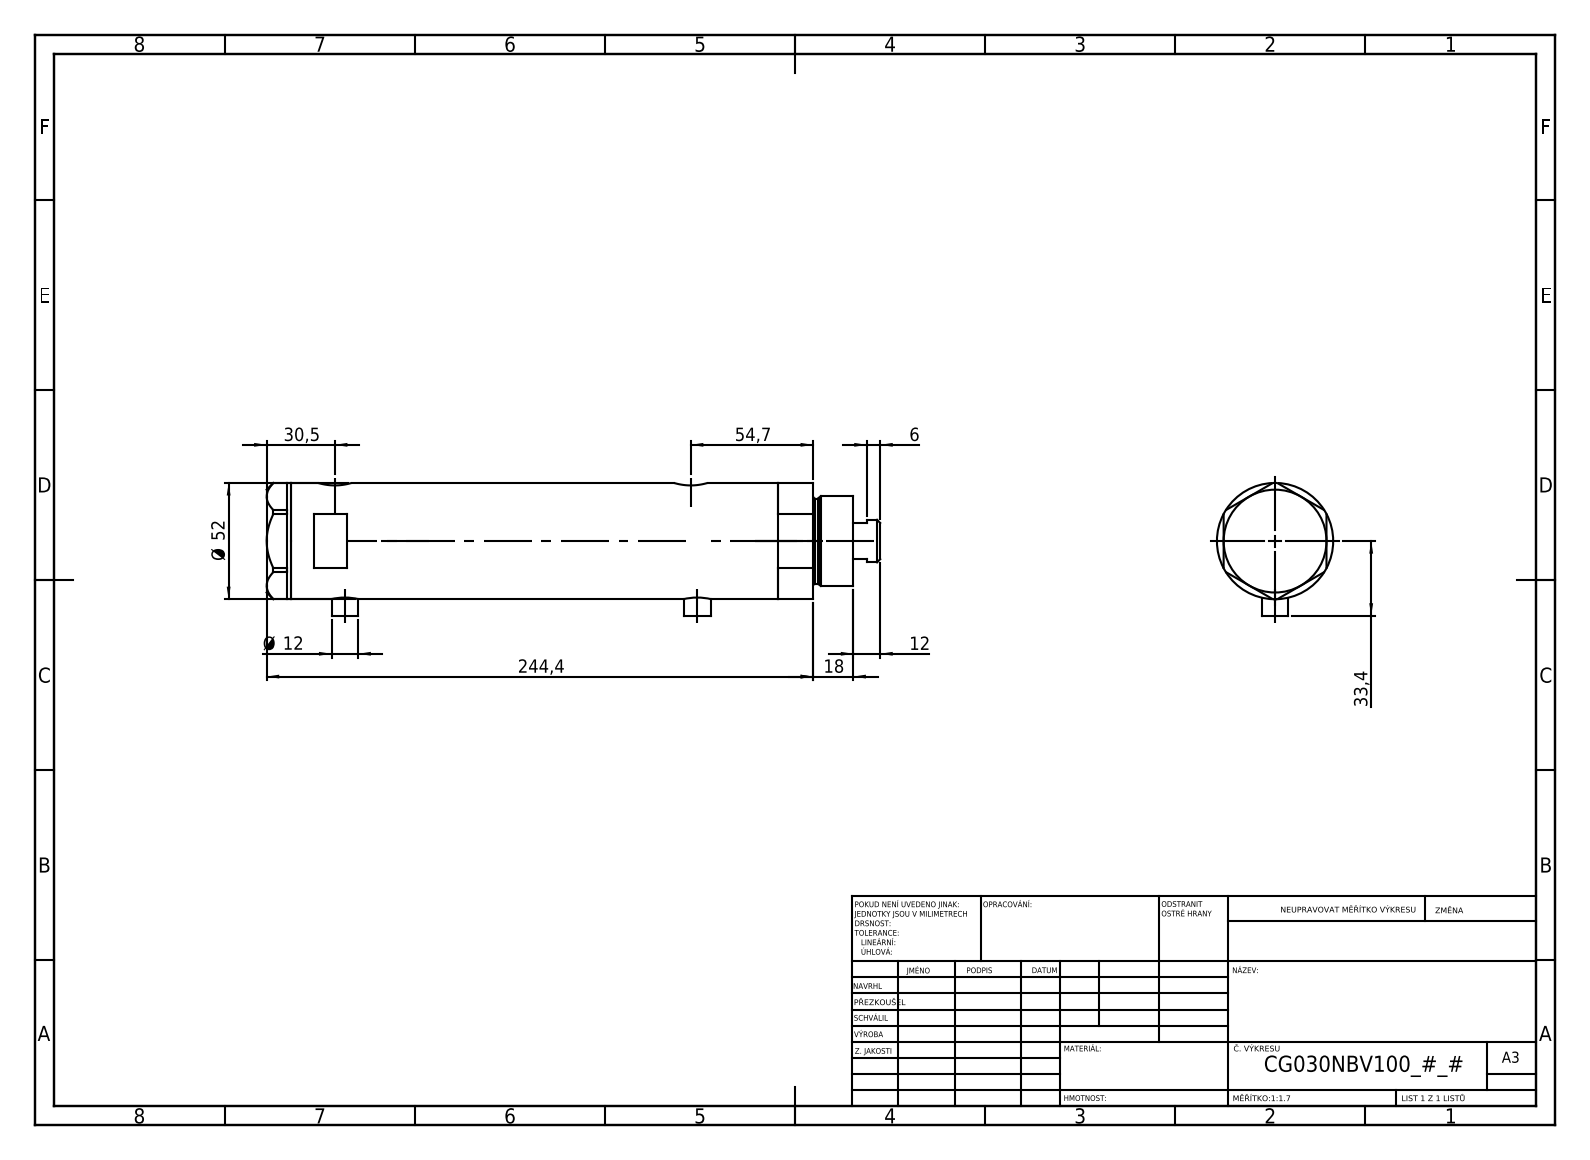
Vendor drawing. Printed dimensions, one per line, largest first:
244,4
54,7
Ø 52
33,4
30,5
18
12
Ø 12
6
